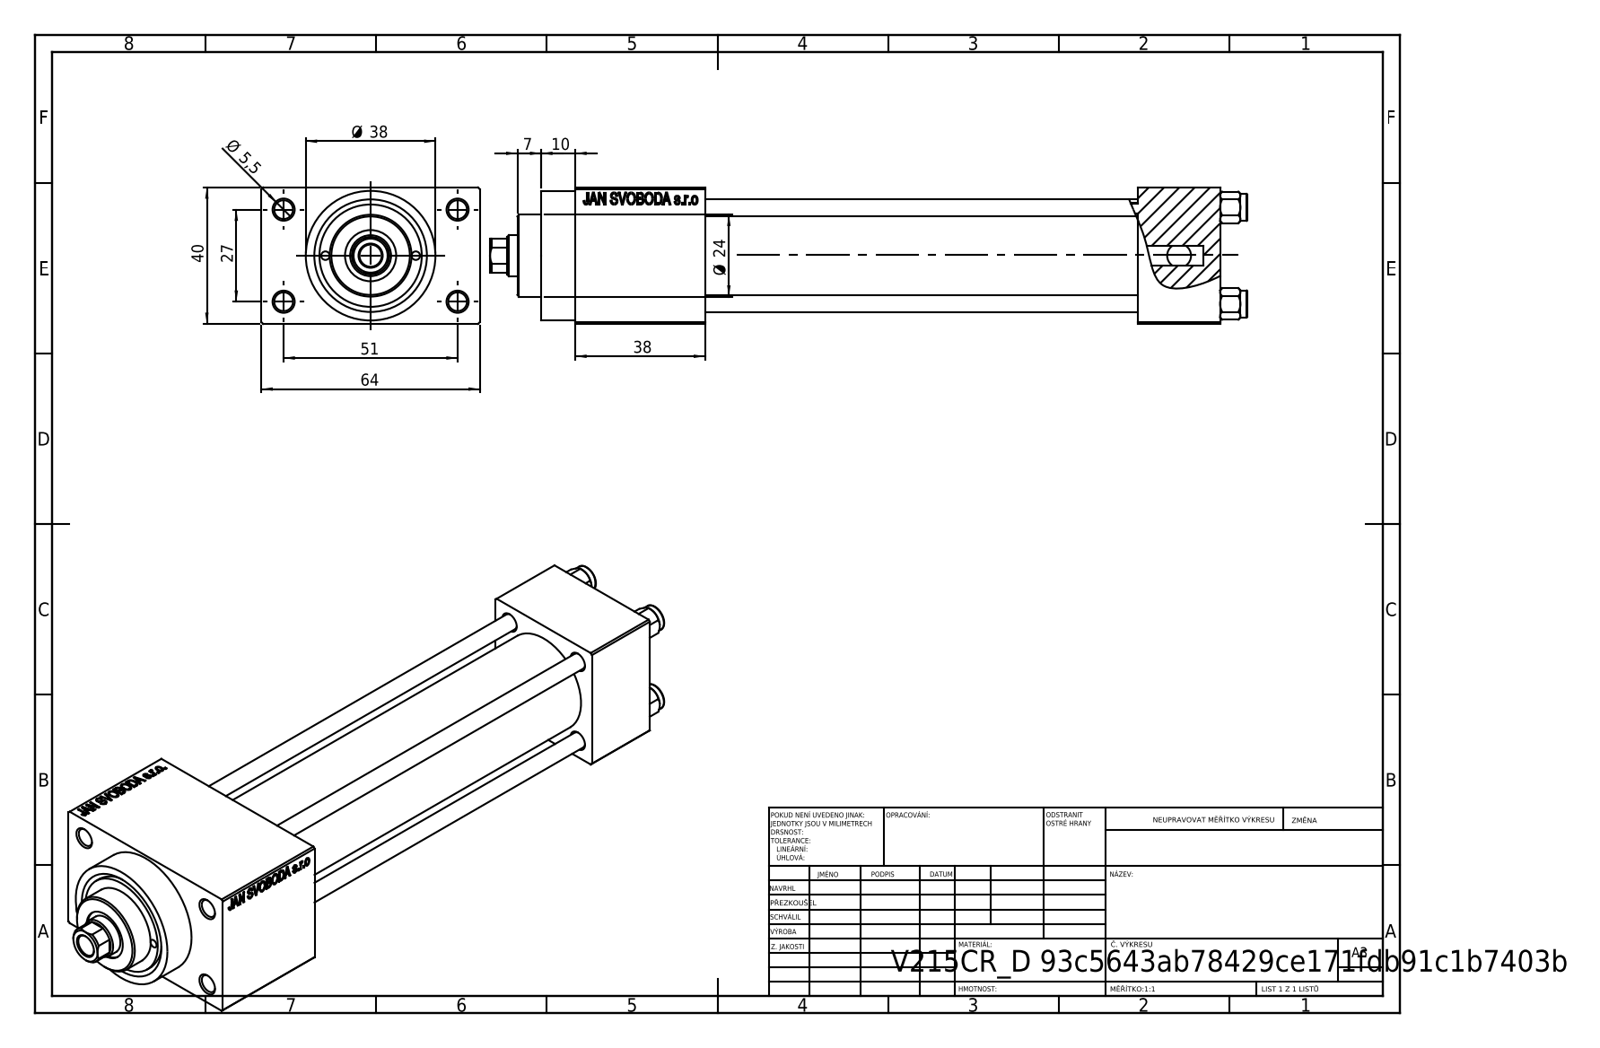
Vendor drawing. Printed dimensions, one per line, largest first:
64
51
40
38
Ø 38
27
Ø 24
10
7
Ø 5,5
